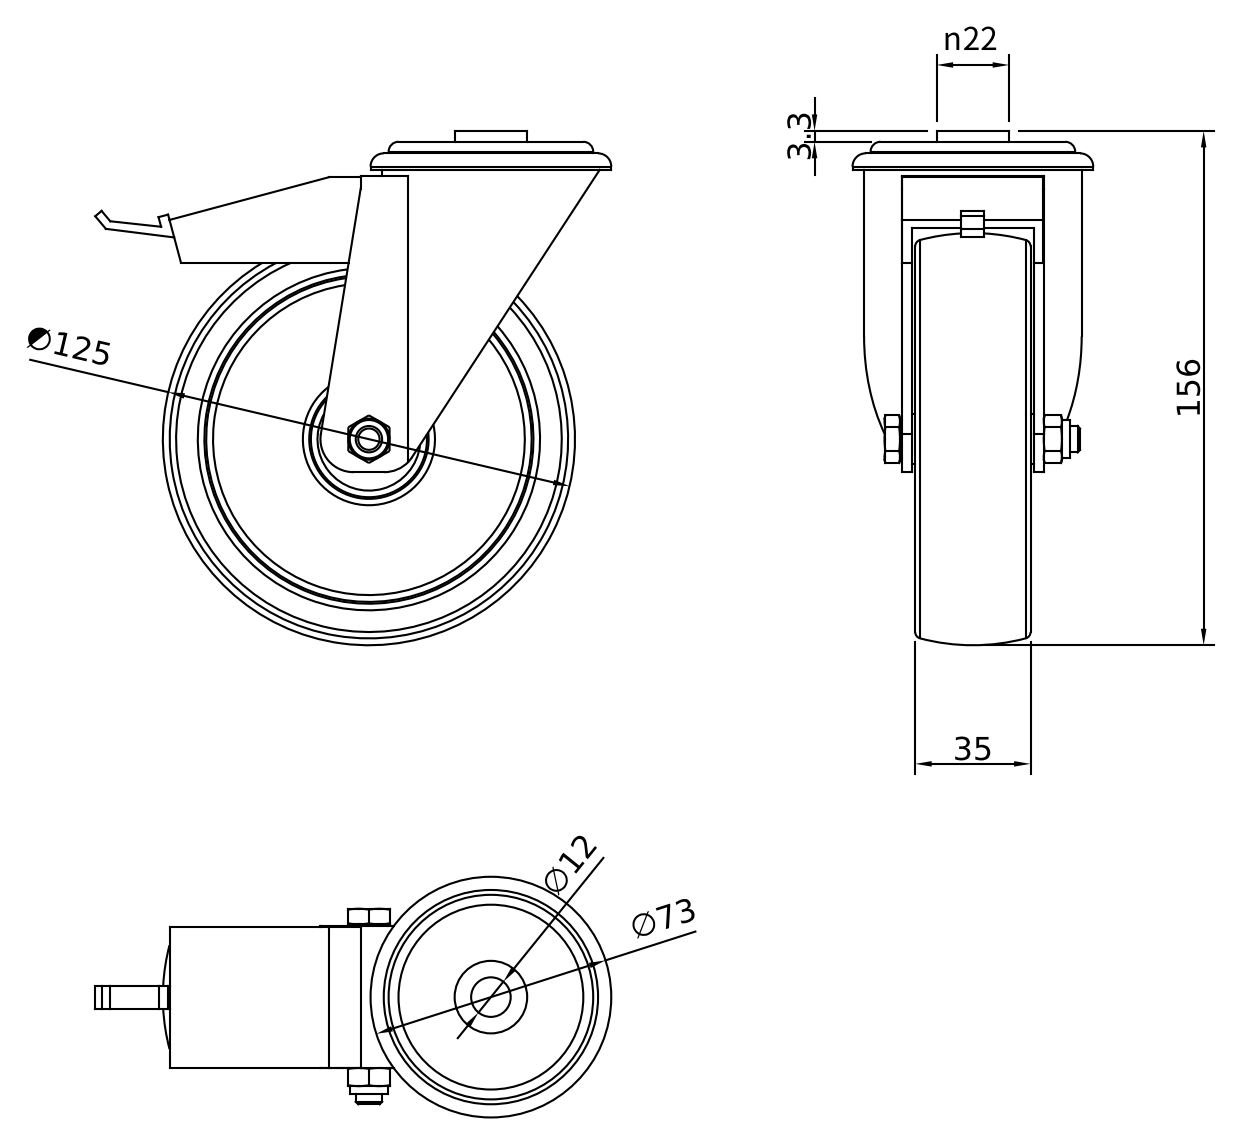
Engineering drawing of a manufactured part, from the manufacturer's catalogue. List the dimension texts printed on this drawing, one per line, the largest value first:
156
∅125
∅73
35
n22
∅12
3.3
